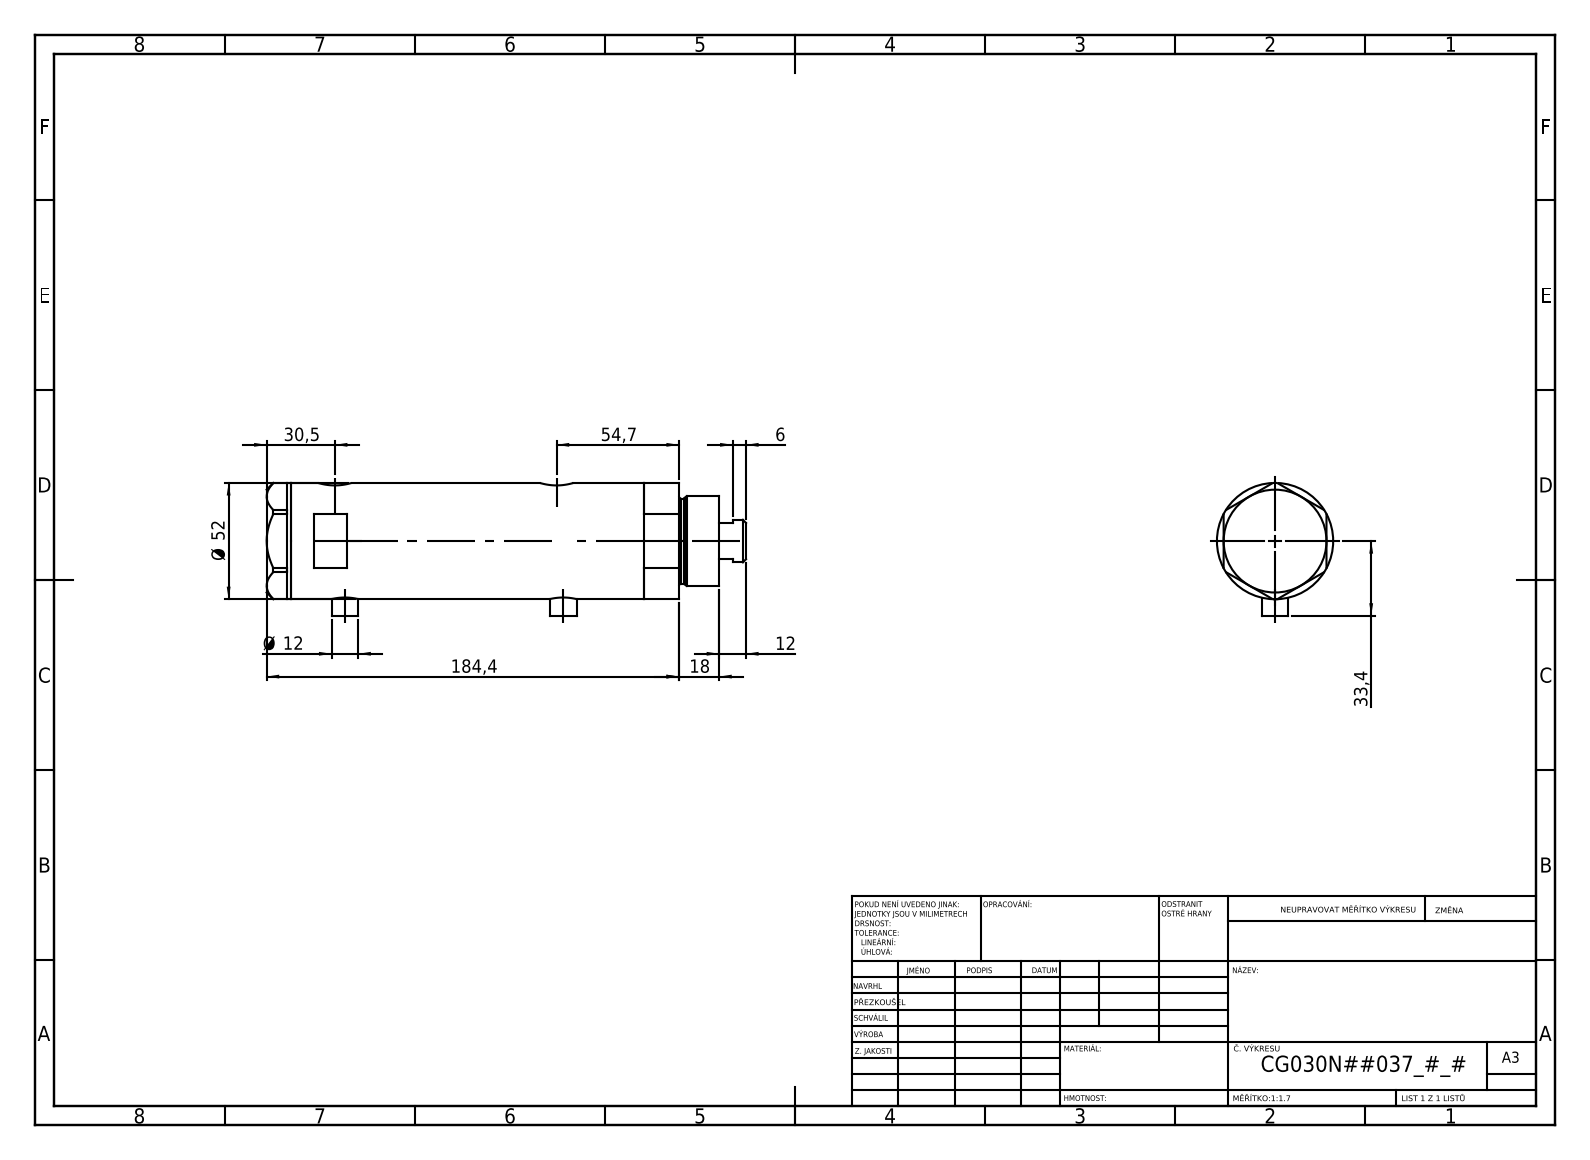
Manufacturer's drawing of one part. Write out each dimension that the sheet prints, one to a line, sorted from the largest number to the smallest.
184,4
54,7
Ø 52
33,4
30,5
18
12
Ø 12
6
